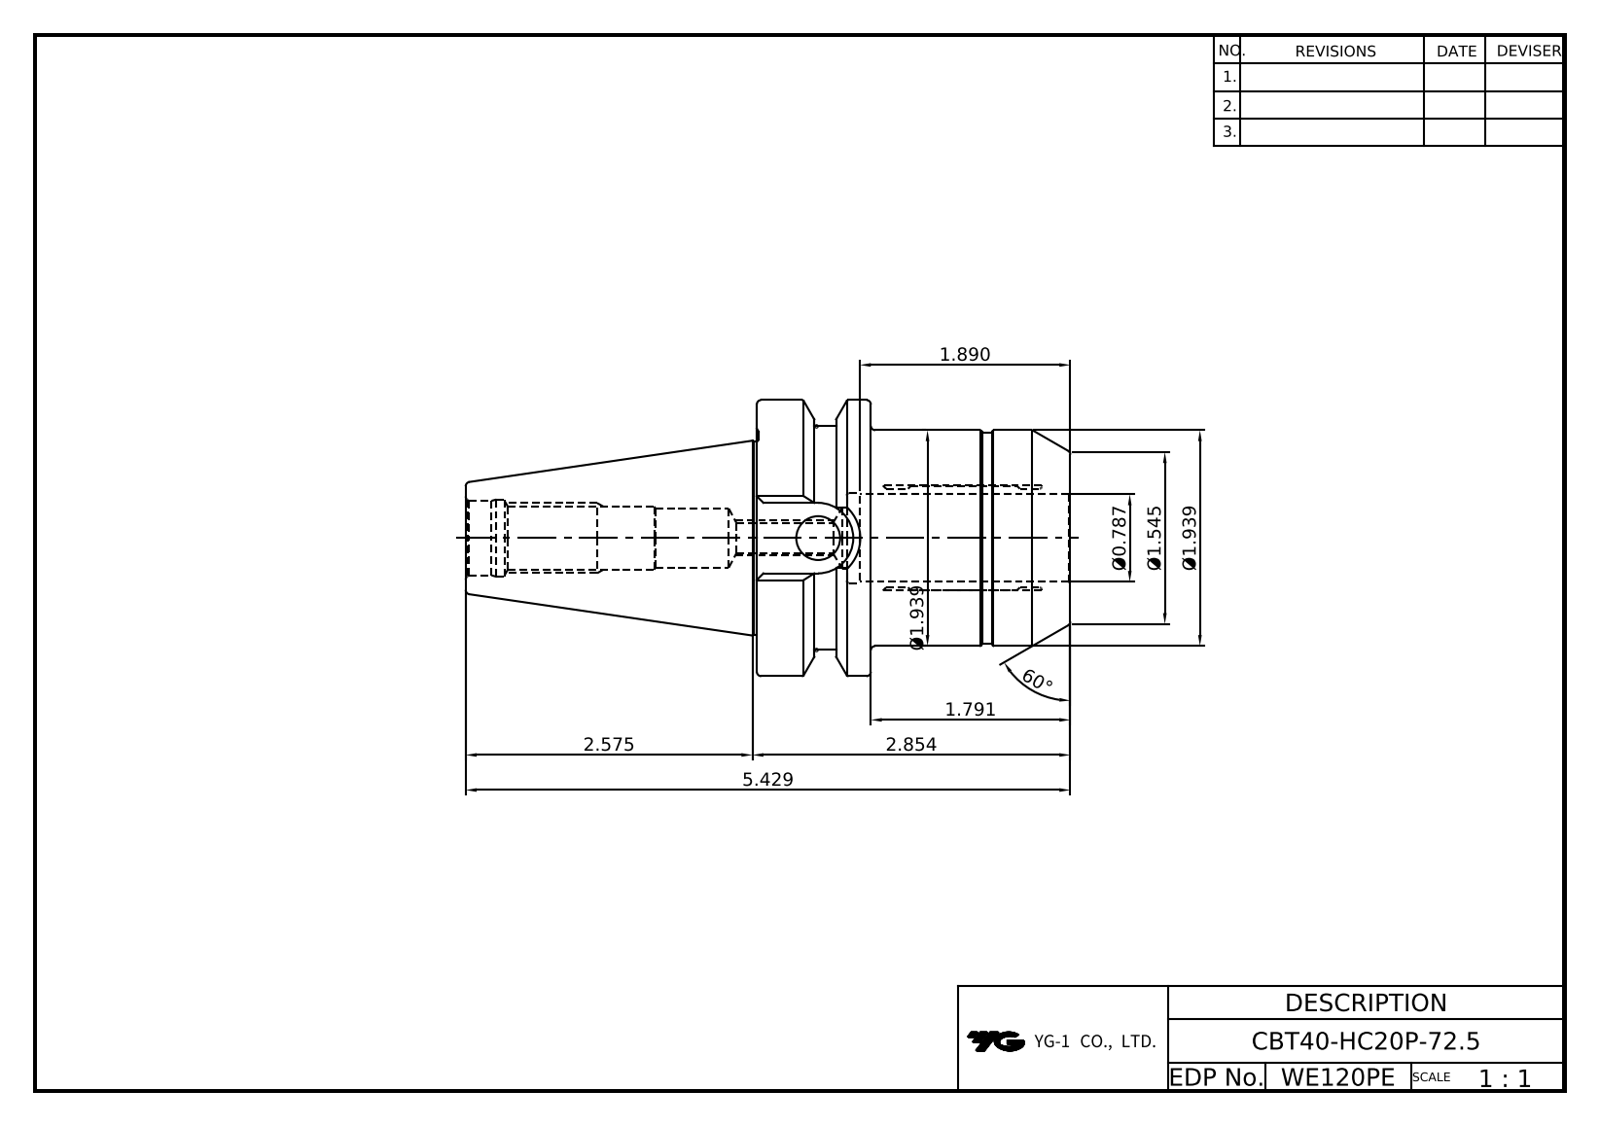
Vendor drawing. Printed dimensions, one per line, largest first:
60°
5.429
2.854
2.575
Ø1.939
Ø1.939
1.890
1.791
Ø1.545
Ø0.787
